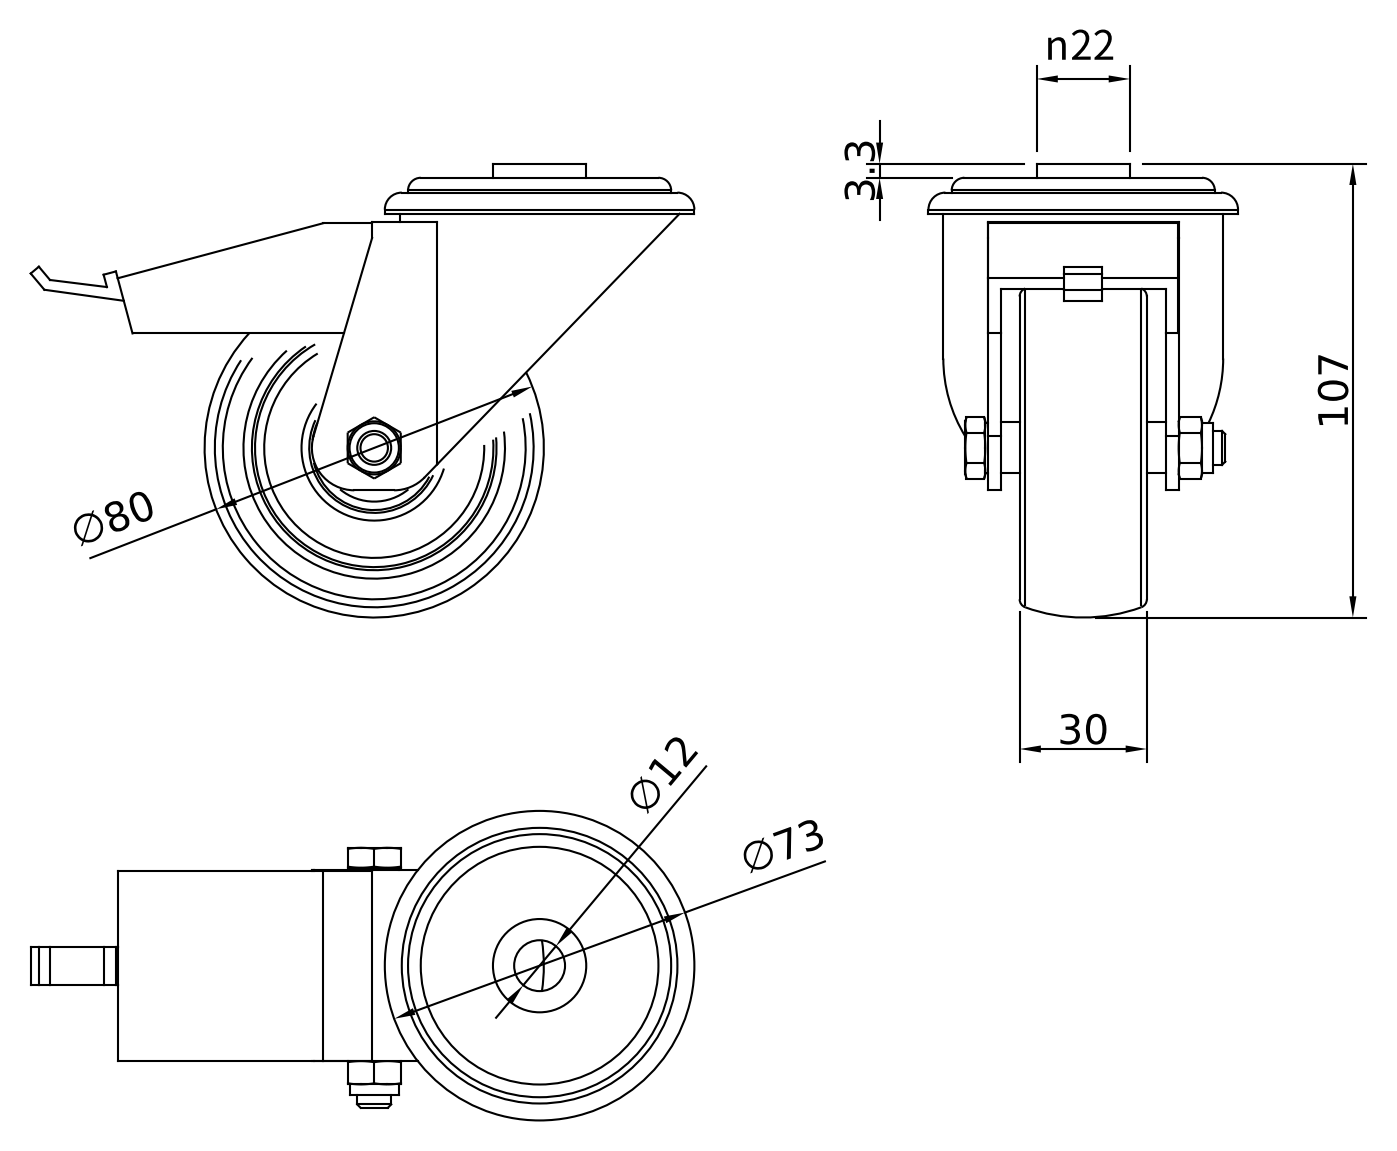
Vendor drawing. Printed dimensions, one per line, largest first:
107
∅80
∅73
30
n22
∅12
3.3
